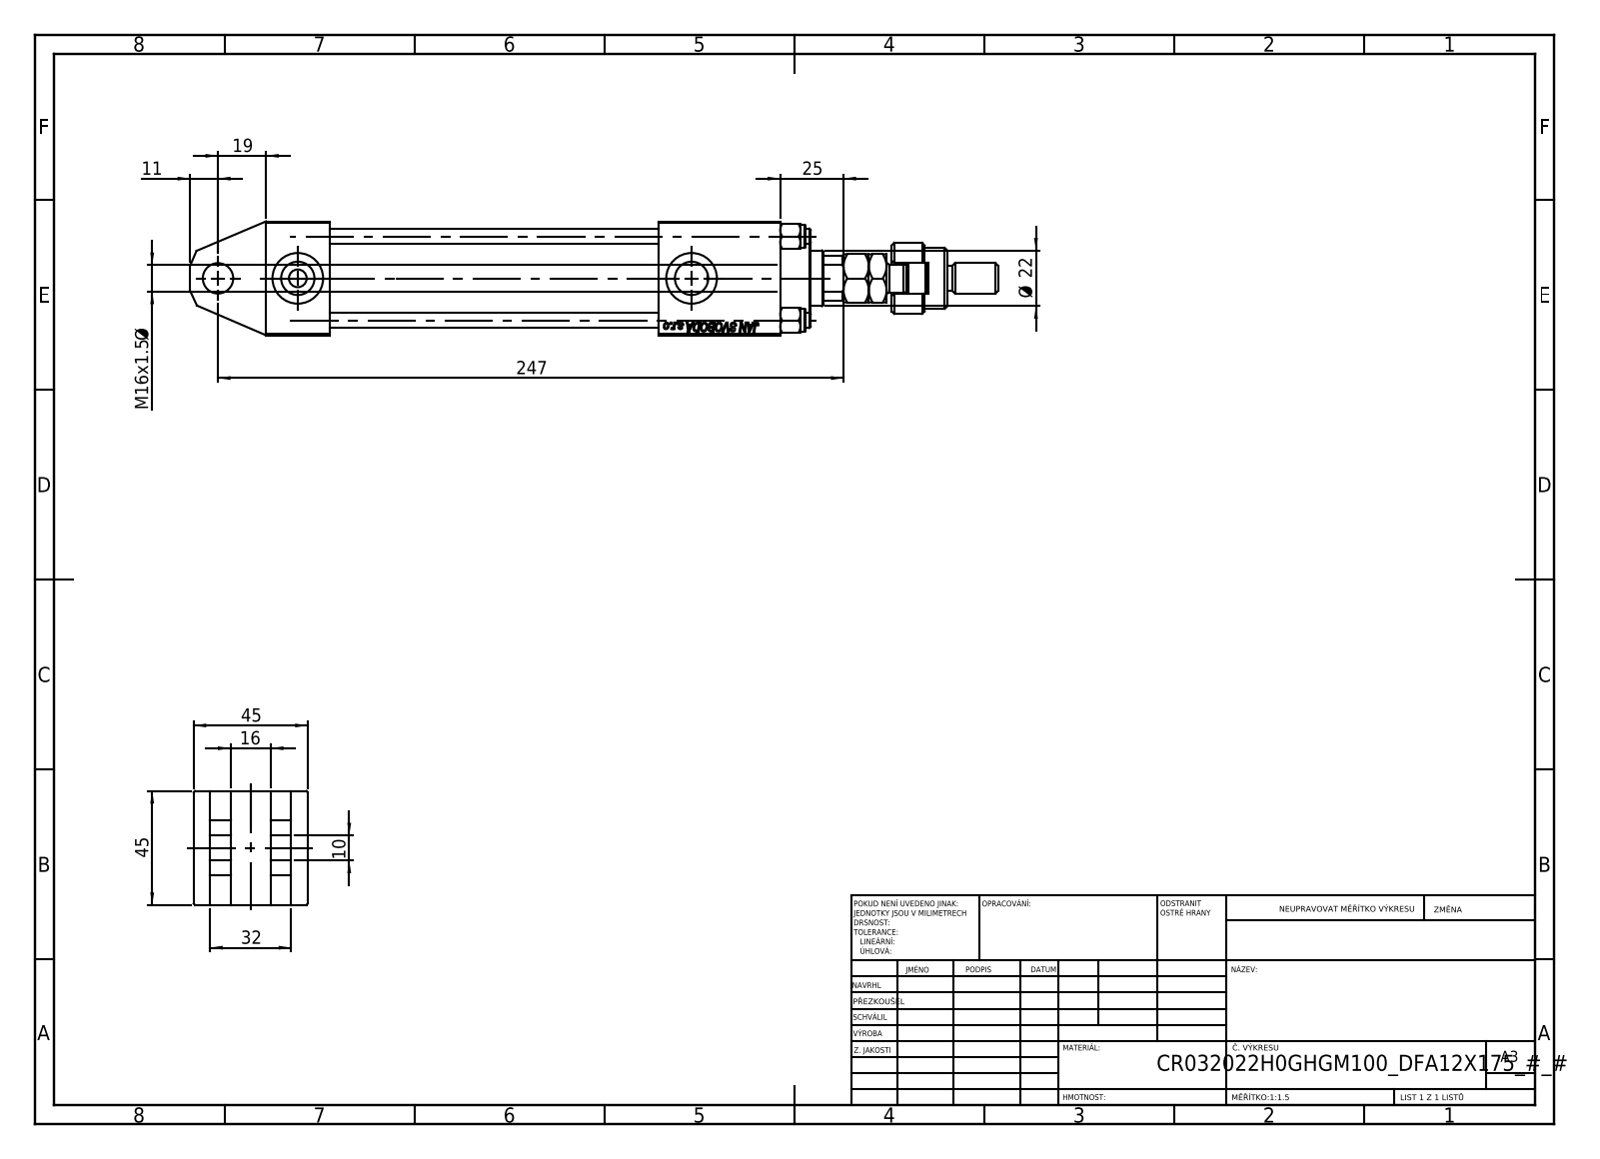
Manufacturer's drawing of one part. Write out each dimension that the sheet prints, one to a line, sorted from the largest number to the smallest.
247
45
45
32
25
Ø 22
19
M16x1.5 Ø
16
11
10
